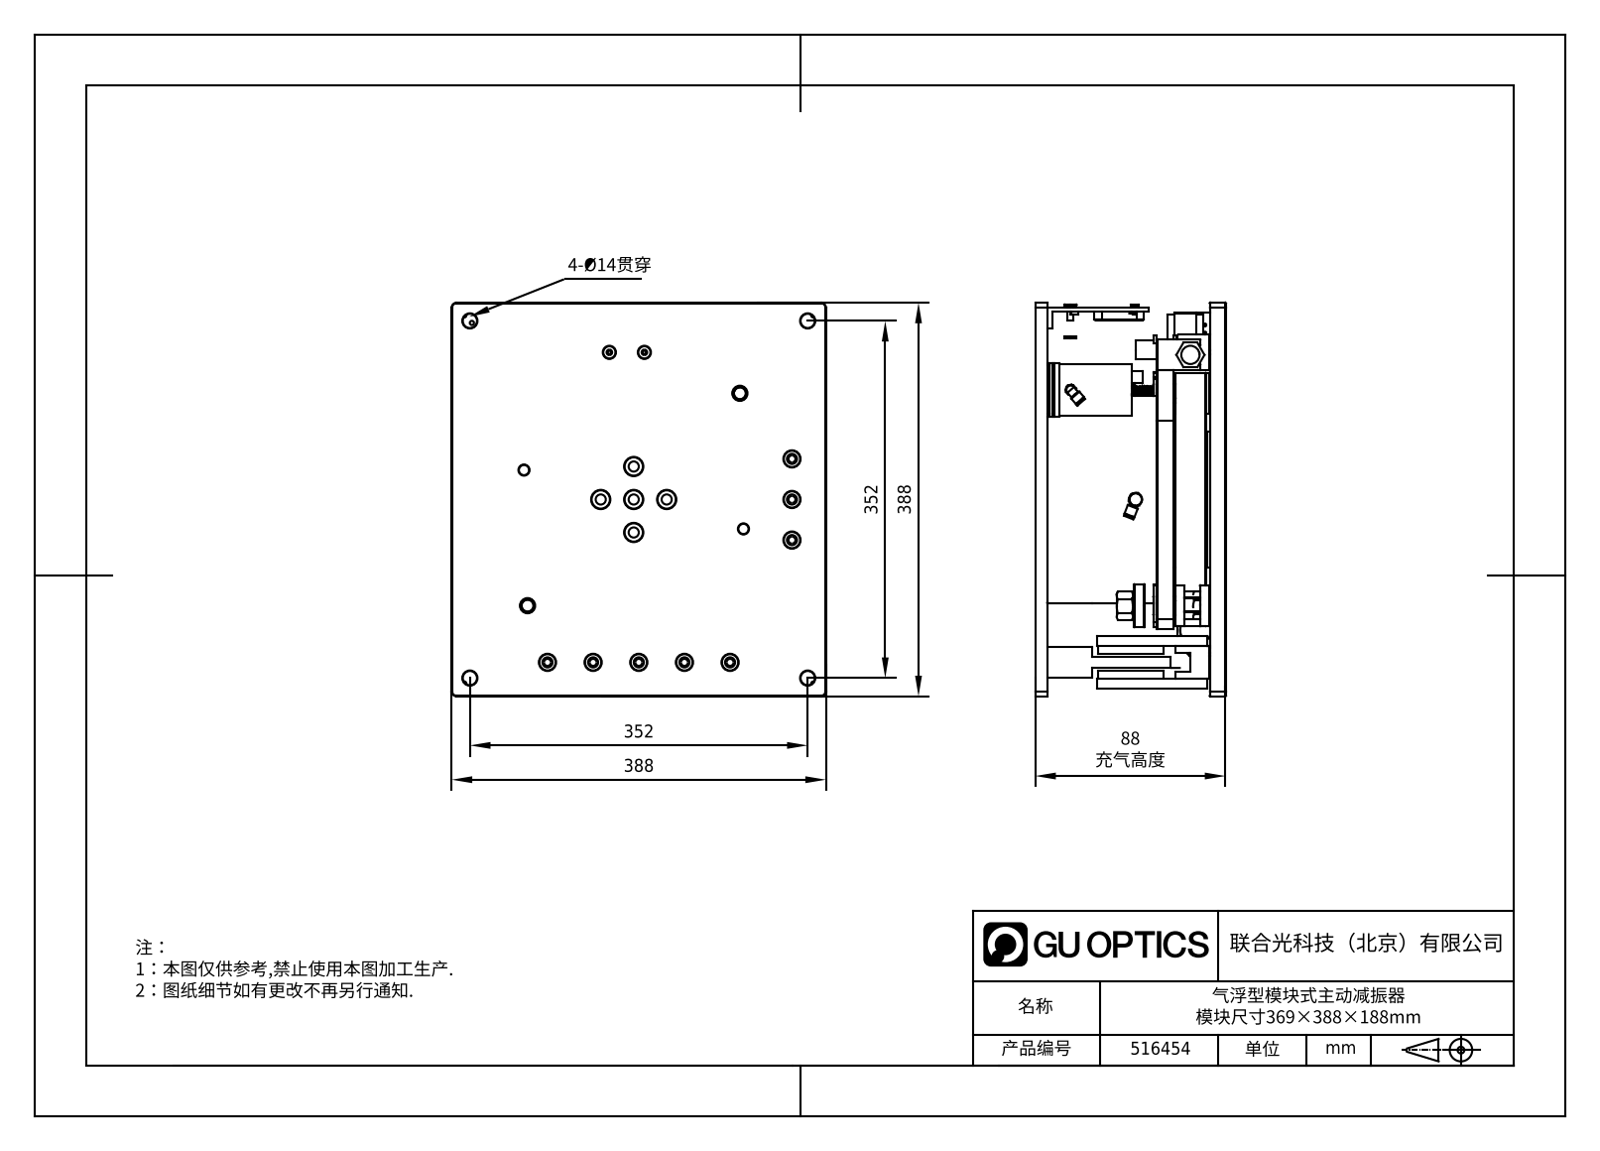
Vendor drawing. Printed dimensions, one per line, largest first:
388
388
352
352
88 充气高度
